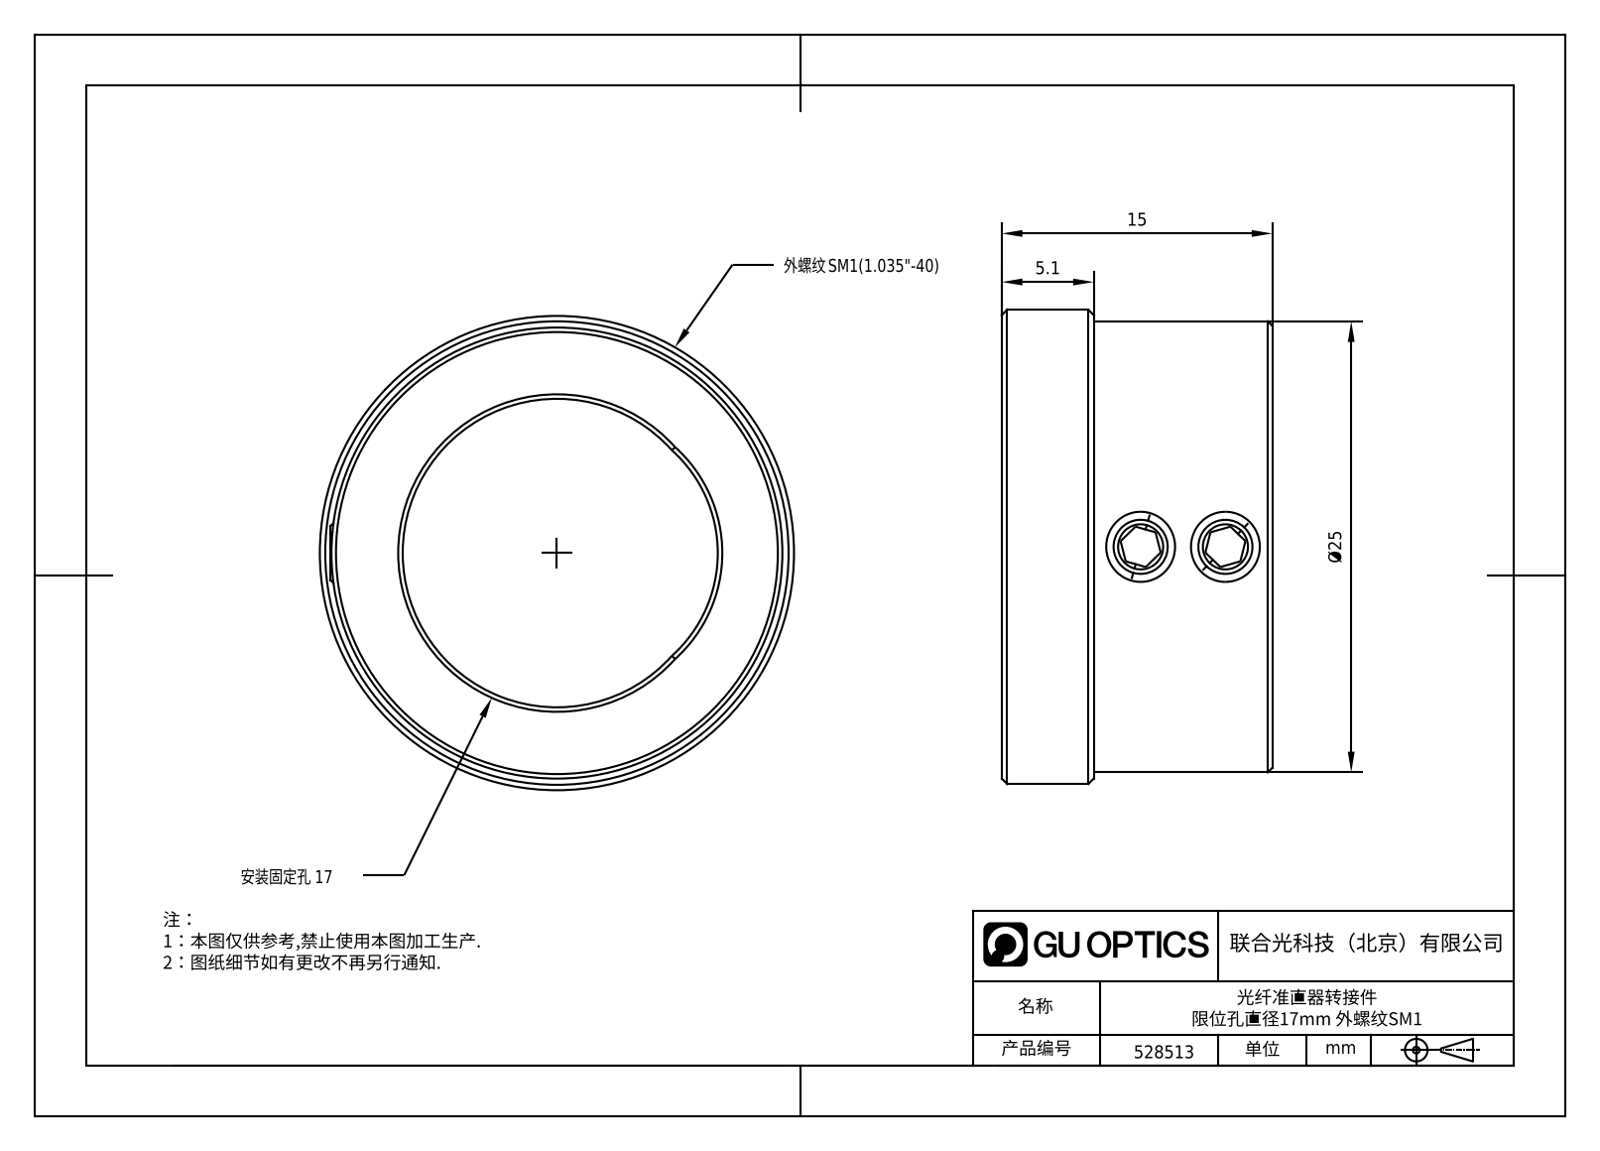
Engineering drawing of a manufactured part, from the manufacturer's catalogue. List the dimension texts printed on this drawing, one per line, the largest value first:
Ø25
15
5.1
